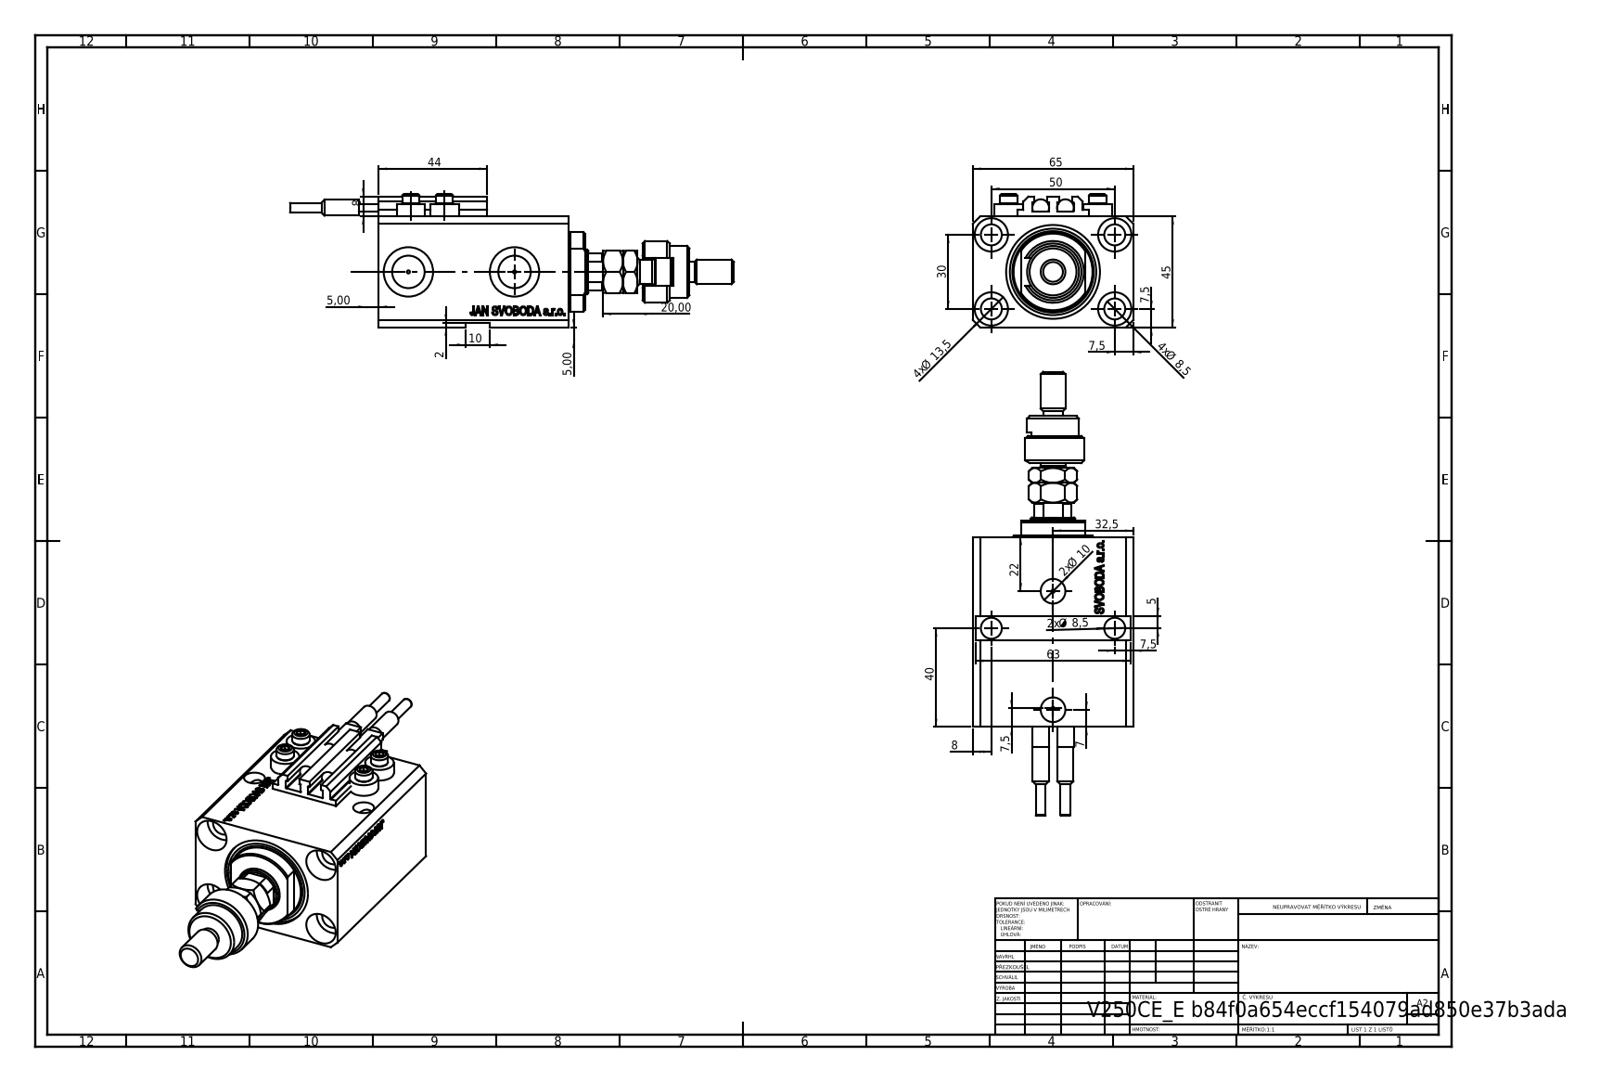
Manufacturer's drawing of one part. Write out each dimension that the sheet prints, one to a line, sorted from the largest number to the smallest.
65
63
50
45
44
40
32,5
30
22
20,00
4x Ø 13,5
10
2x Ø 10
4x Ø 8,5
2x Ø 8,5
8
8
7,5
7,5
7,5
7,5
7
5,00
5,00
5
2
